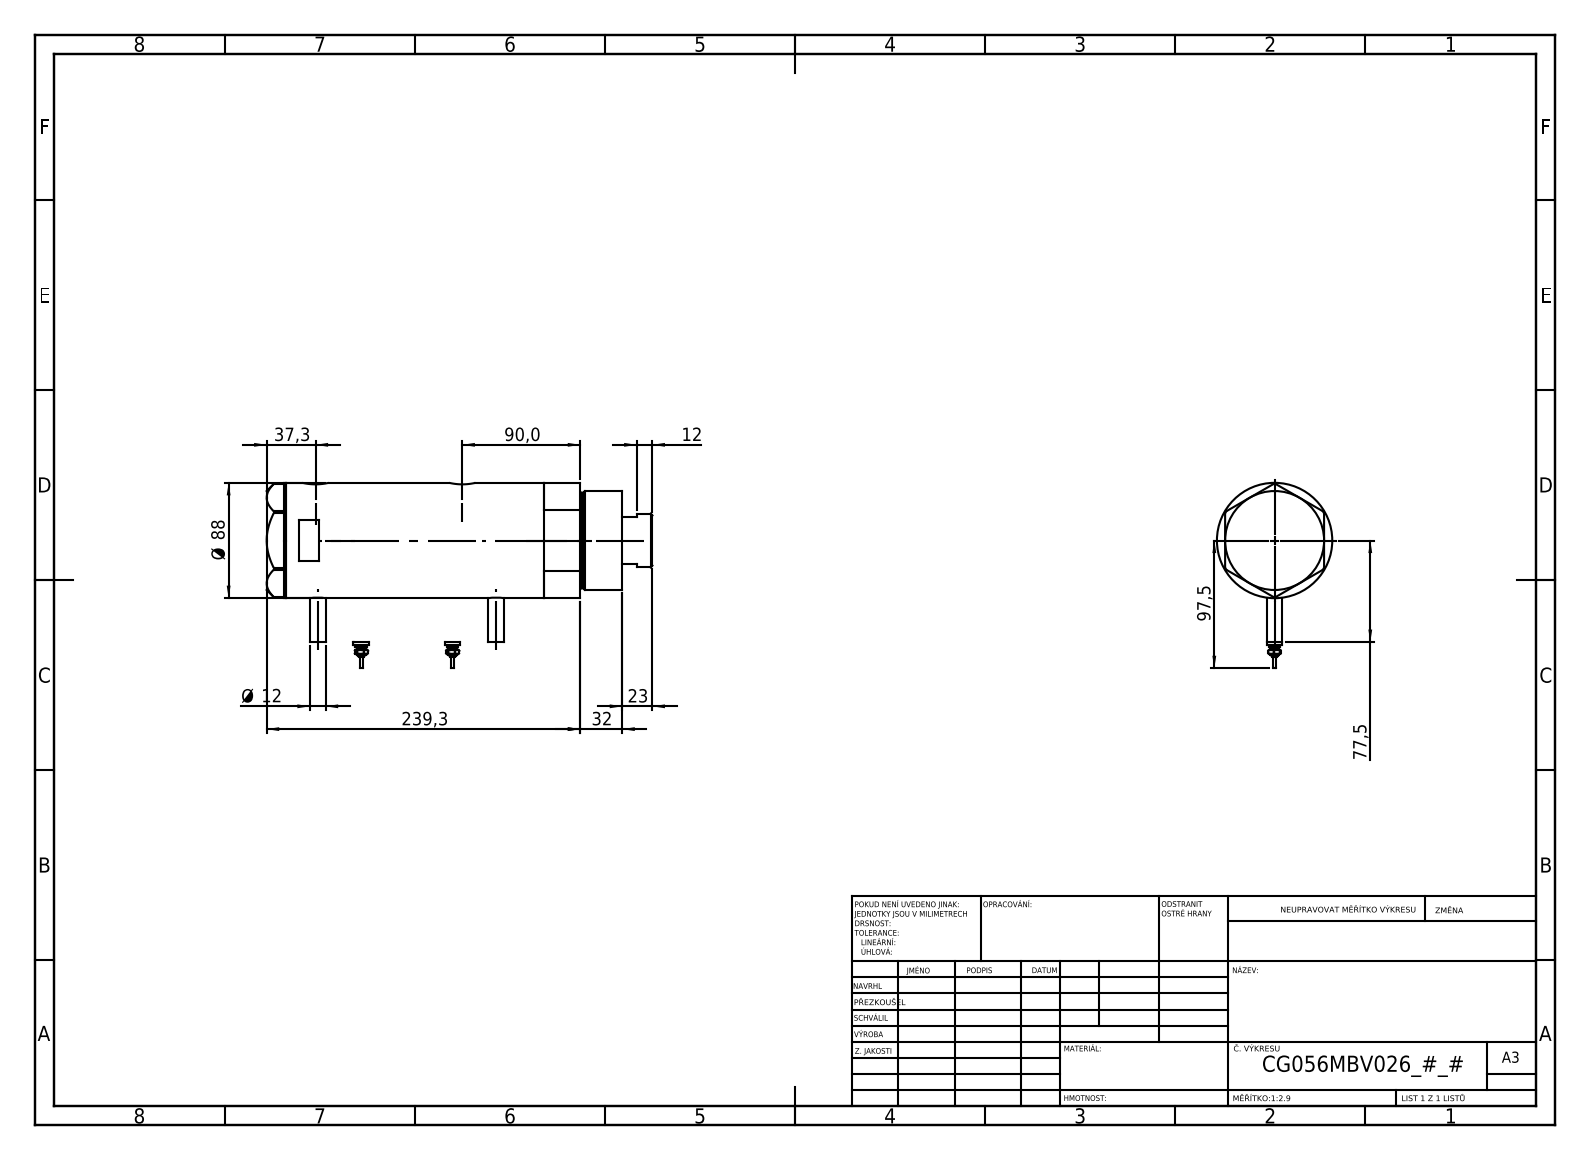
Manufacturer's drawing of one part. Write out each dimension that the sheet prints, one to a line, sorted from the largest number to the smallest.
239,3
97,5
90,0
Ø 88
77,5
37,3
32
23
12
Ø 12
